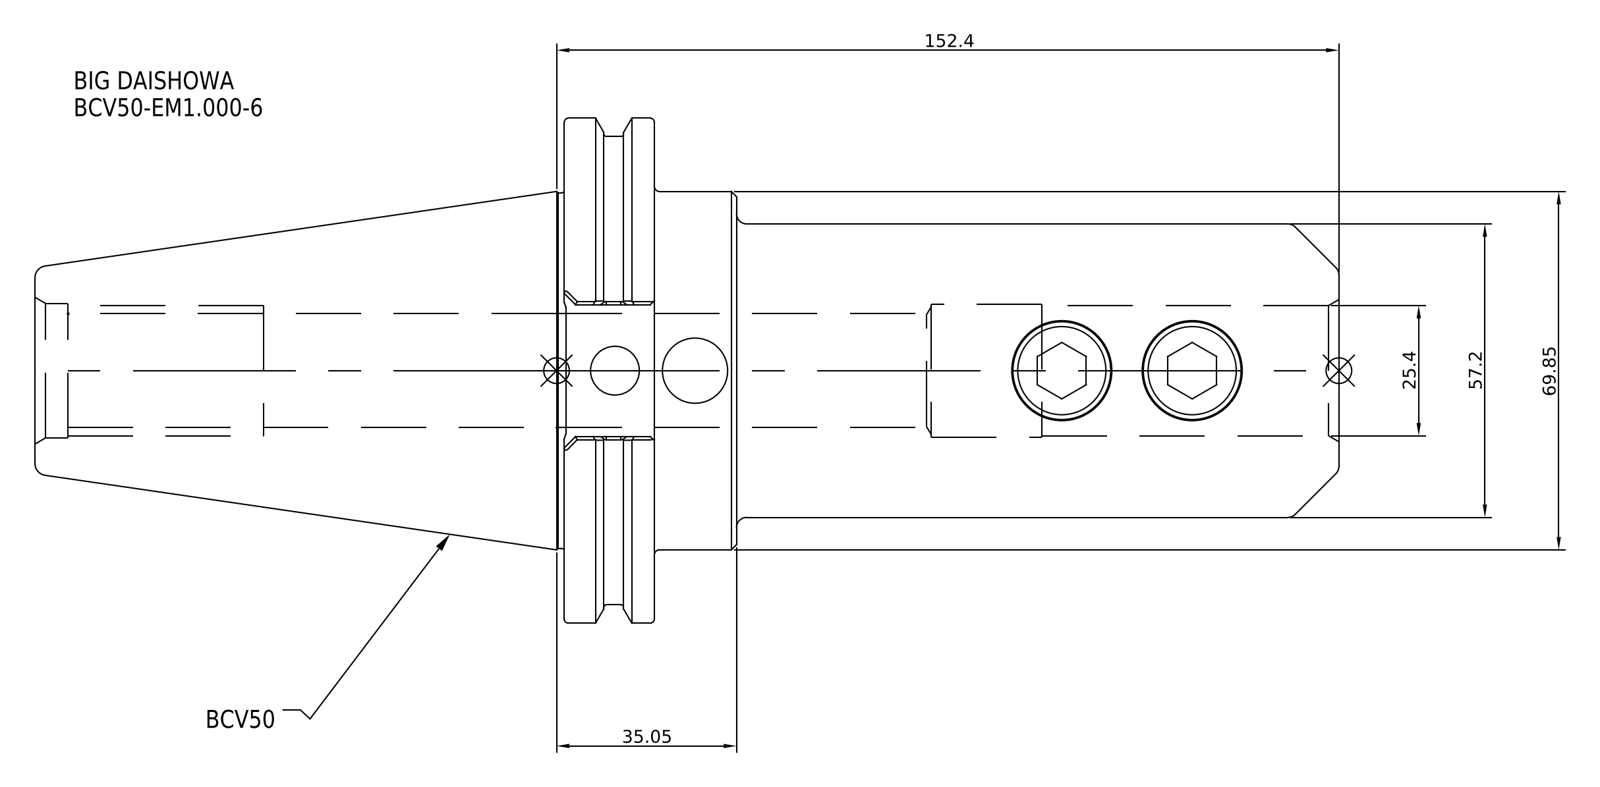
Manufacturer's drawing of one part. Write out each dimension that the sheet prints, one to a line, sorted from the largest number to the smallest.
152.4
69.85
57.2
35.05
25.4
